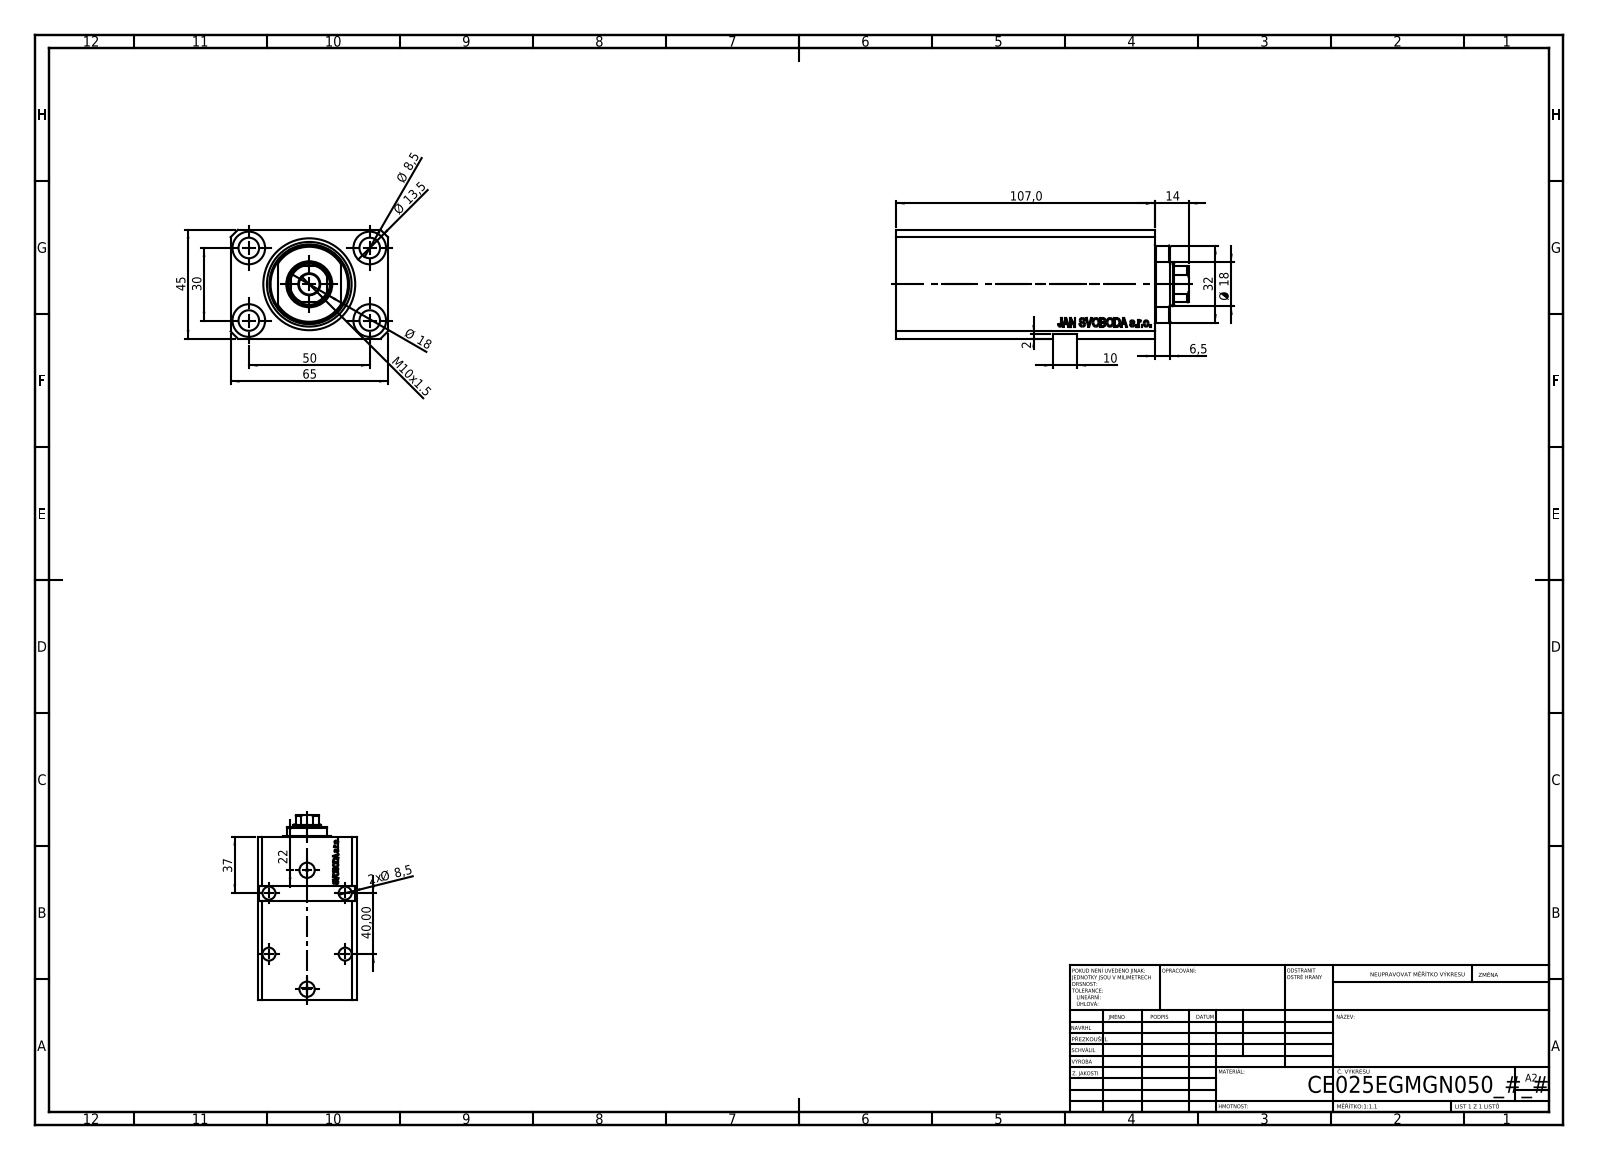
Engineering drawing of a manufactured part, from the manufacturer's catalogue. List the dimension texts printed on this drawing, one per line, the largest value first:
107,0
65
50
45
40,00
37
32
30
22
Ø 18
Ø 18
14
Ø 13,5
M10x1.5
10
Ø 8,5
2x Ø 8,5
6,5
2
